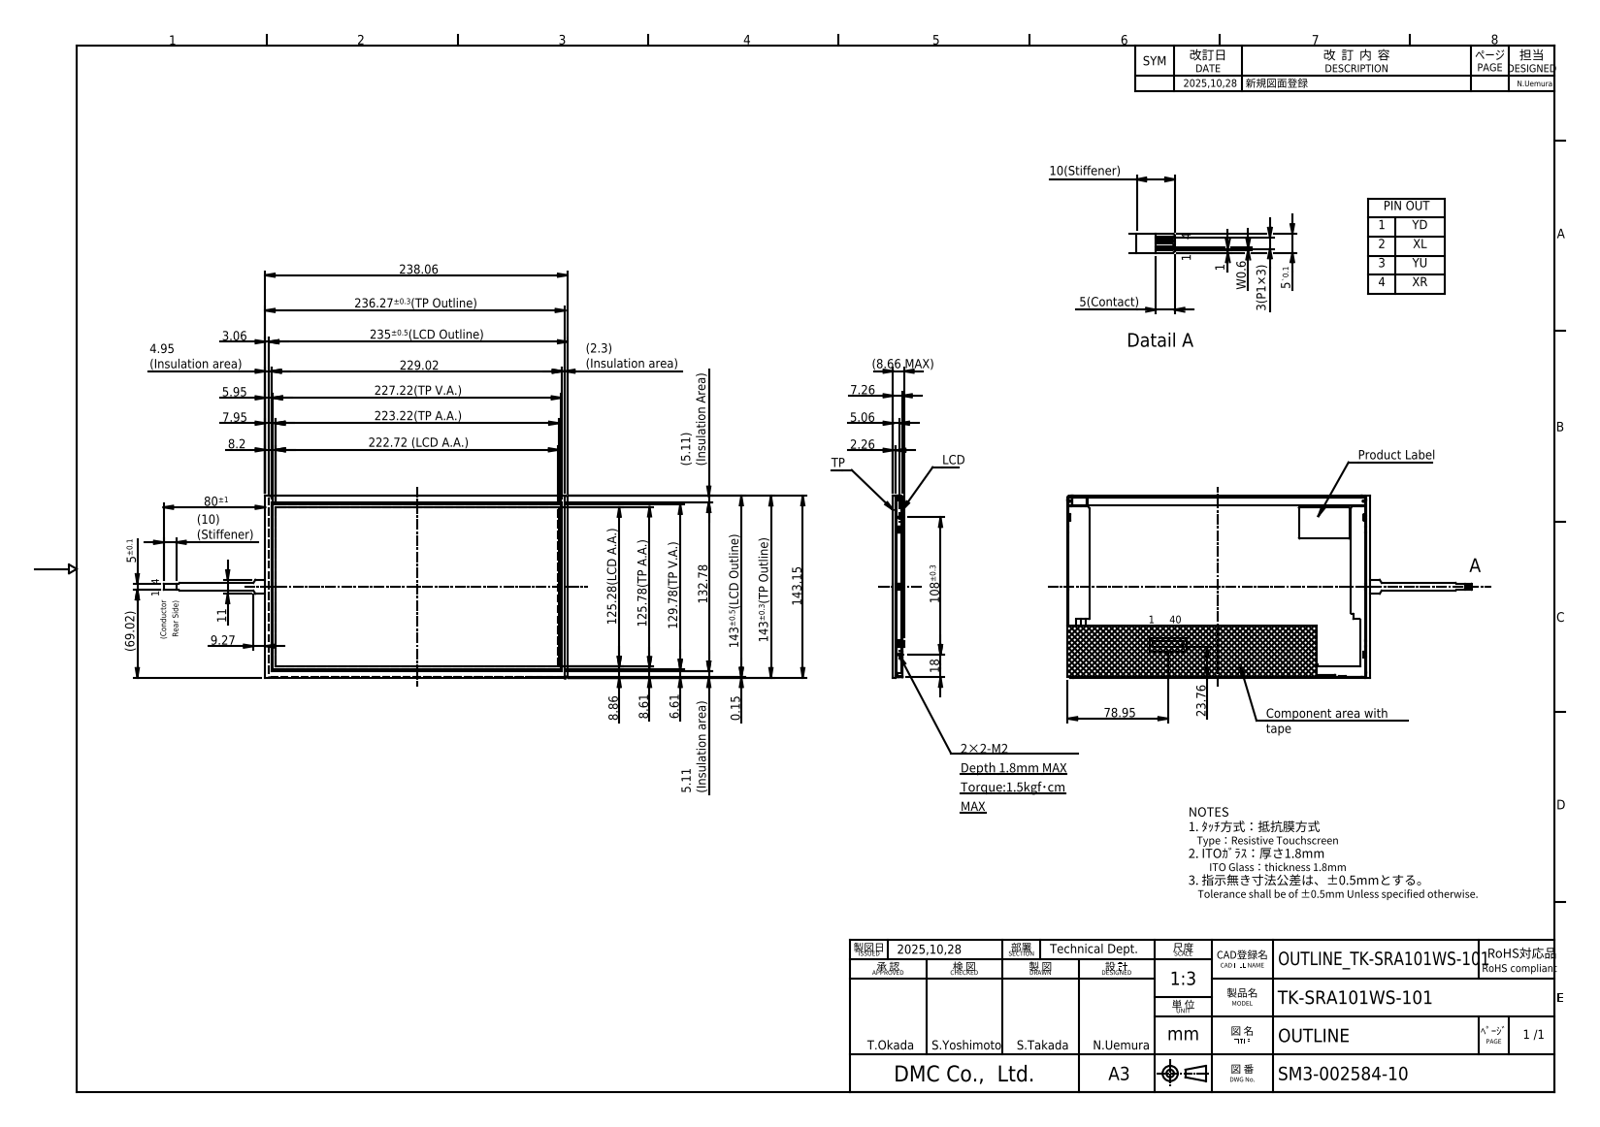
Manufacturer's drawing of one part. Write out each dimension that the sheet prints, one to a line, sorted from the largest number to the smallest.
238.06
236.27±0.3(TP Outline)
235±0.5(LCD Outline)
229.02
227.22(TP V.A.)
223.22(TP A.A.)
222.72 (LCD A.A.)
143.15
143±0.5(LCD Outline)
143±0.3(TP Outline)
132.78
129.78(TP V.A.)
125.78(TP A.A.)
125.28(LCD A.A.)
108±0.3
80±1
78.95
(69.02)
23.76
18
11
(10) (Stiffener)
9.27
8.86
(8.66 MAX)
8.61
8.2
7.95
7.26
6.61
5.95
5.11 (Insulation area)
(5.11) (Insulation Area)
5.06
5±0.1
4.95 (Insulation area)
3.06
(2.3) (Insulation area)
2.26
0.15
